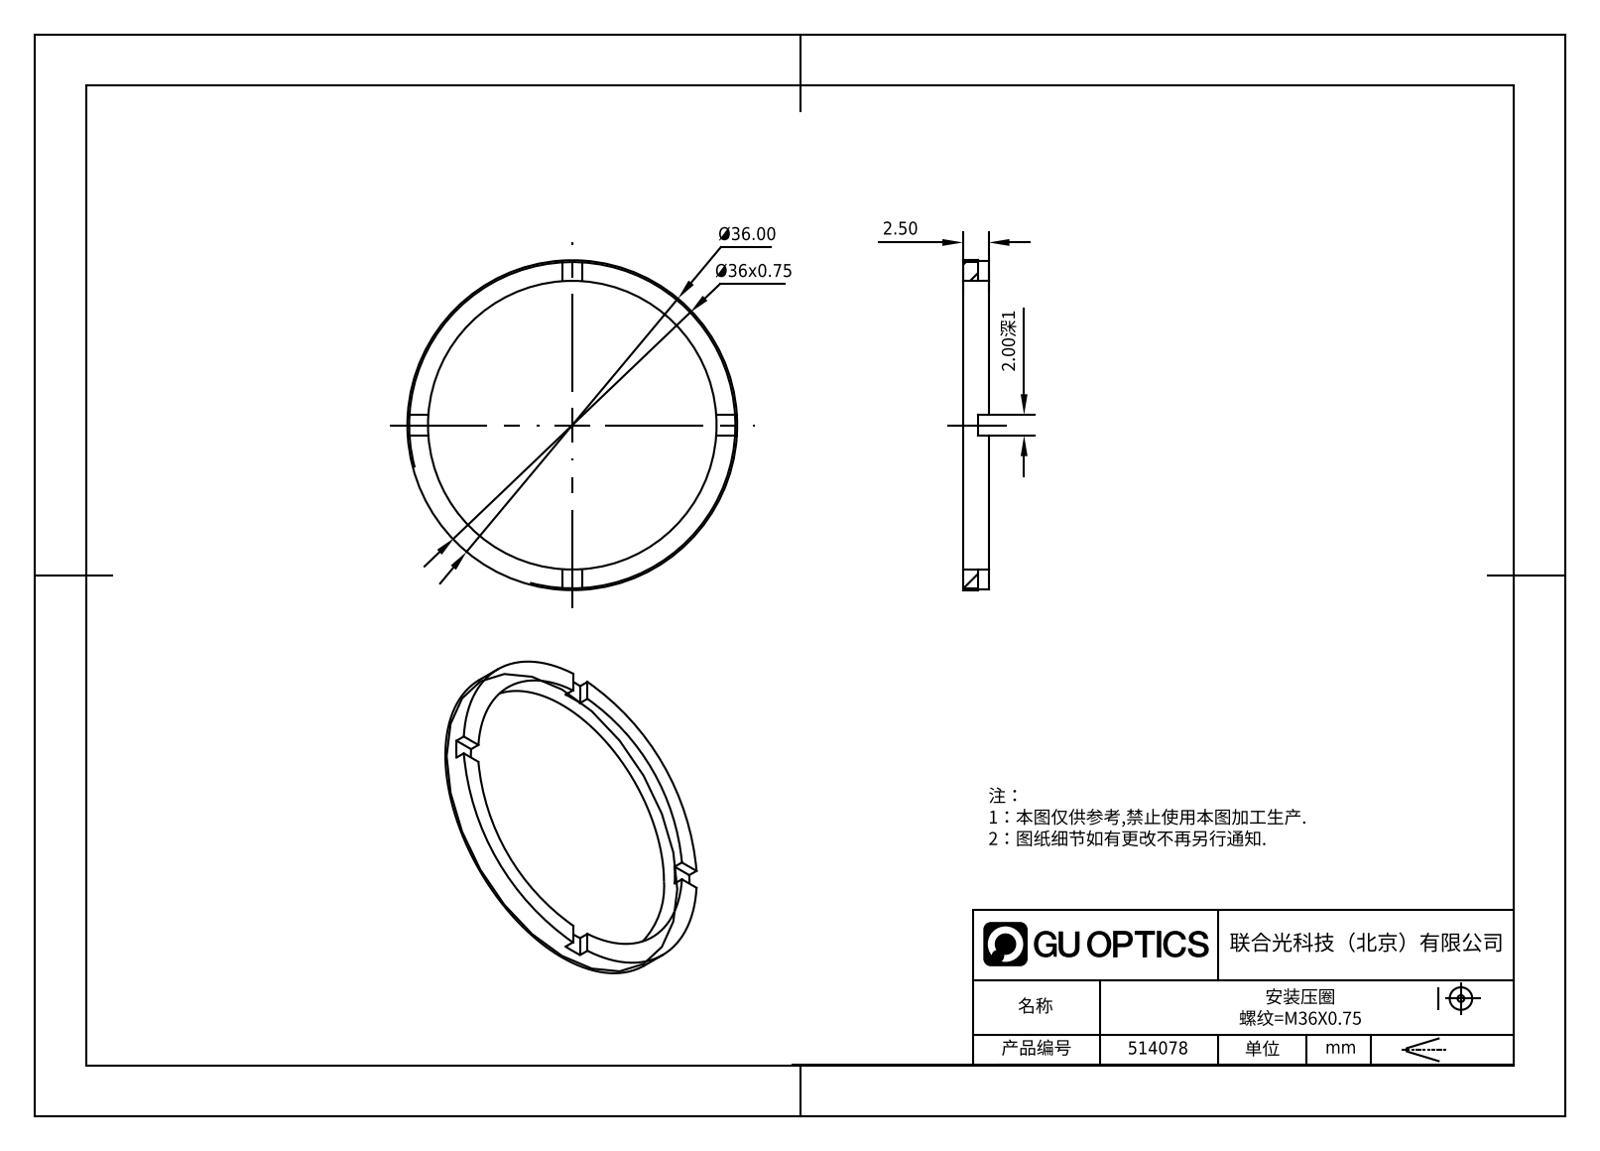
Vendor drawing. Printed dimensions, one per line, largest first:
Ø36.00
Ø36x0.75
2.50
2.00深1
